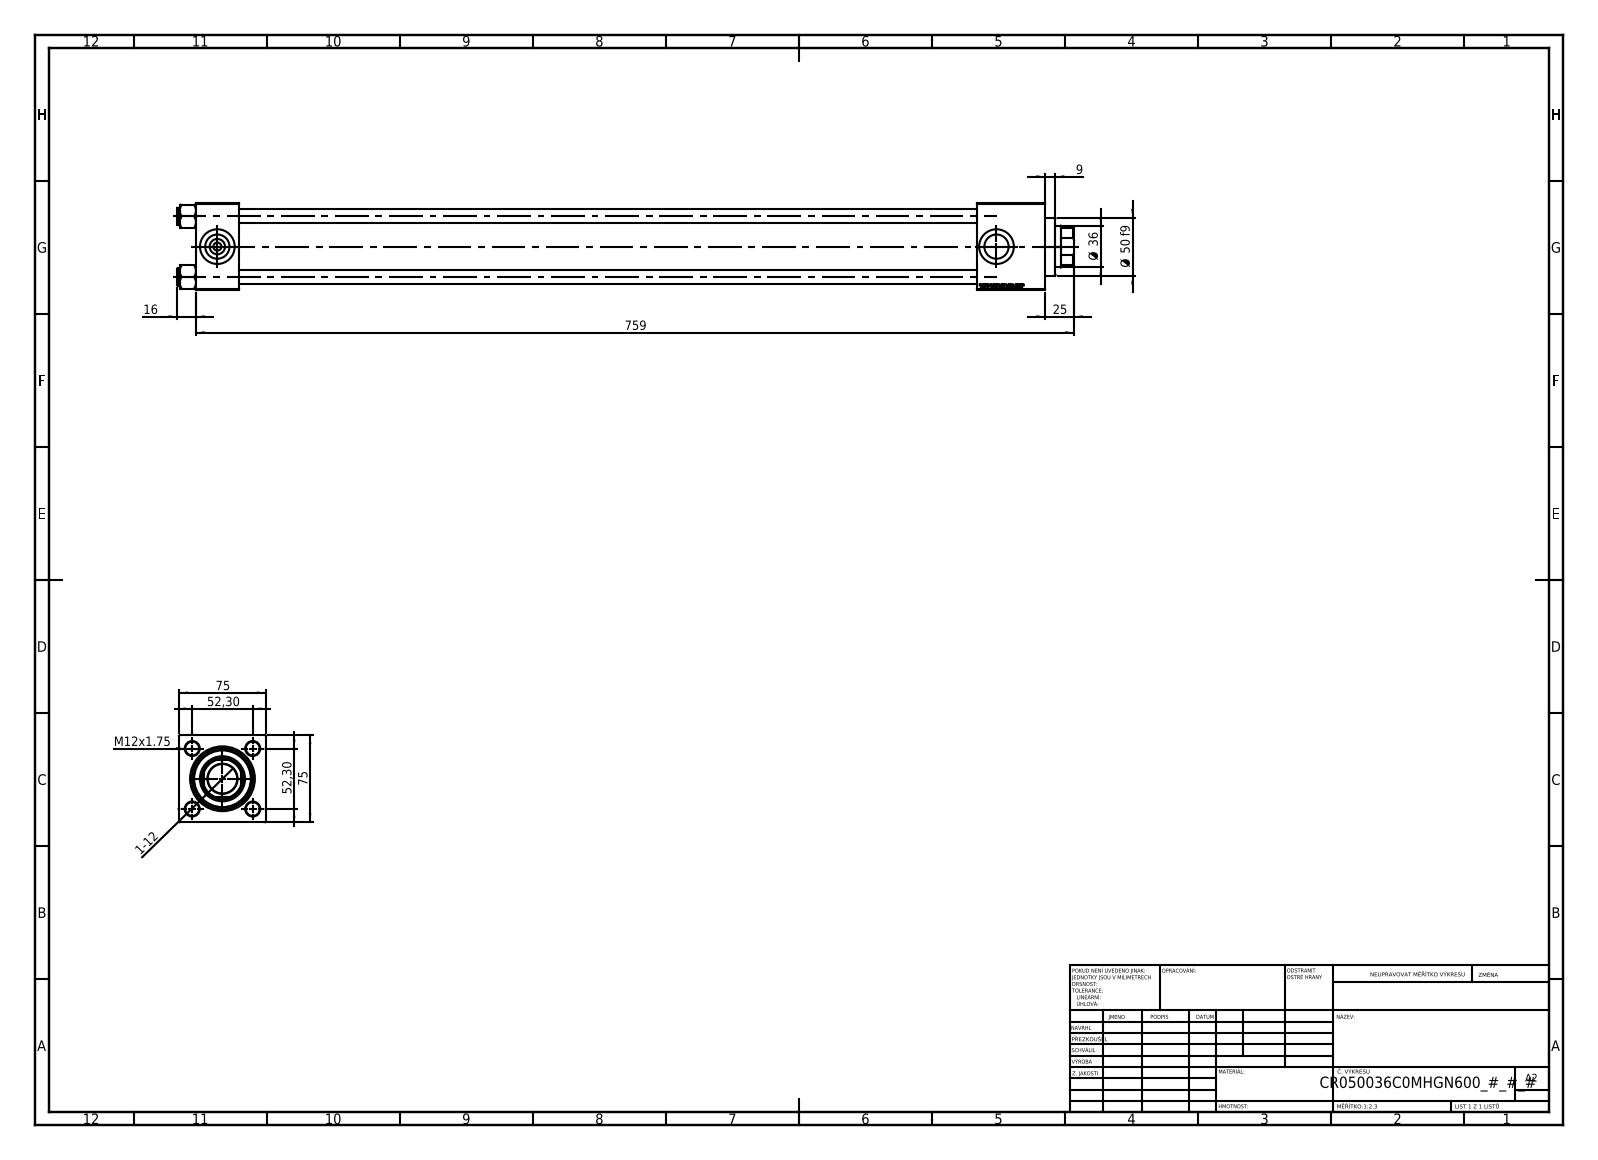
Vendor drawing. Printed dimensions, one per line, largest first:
759
75
75
52,30
52,30
Ø 50 f9
Ø 36
25
16
M12x1.75
9
1-12
